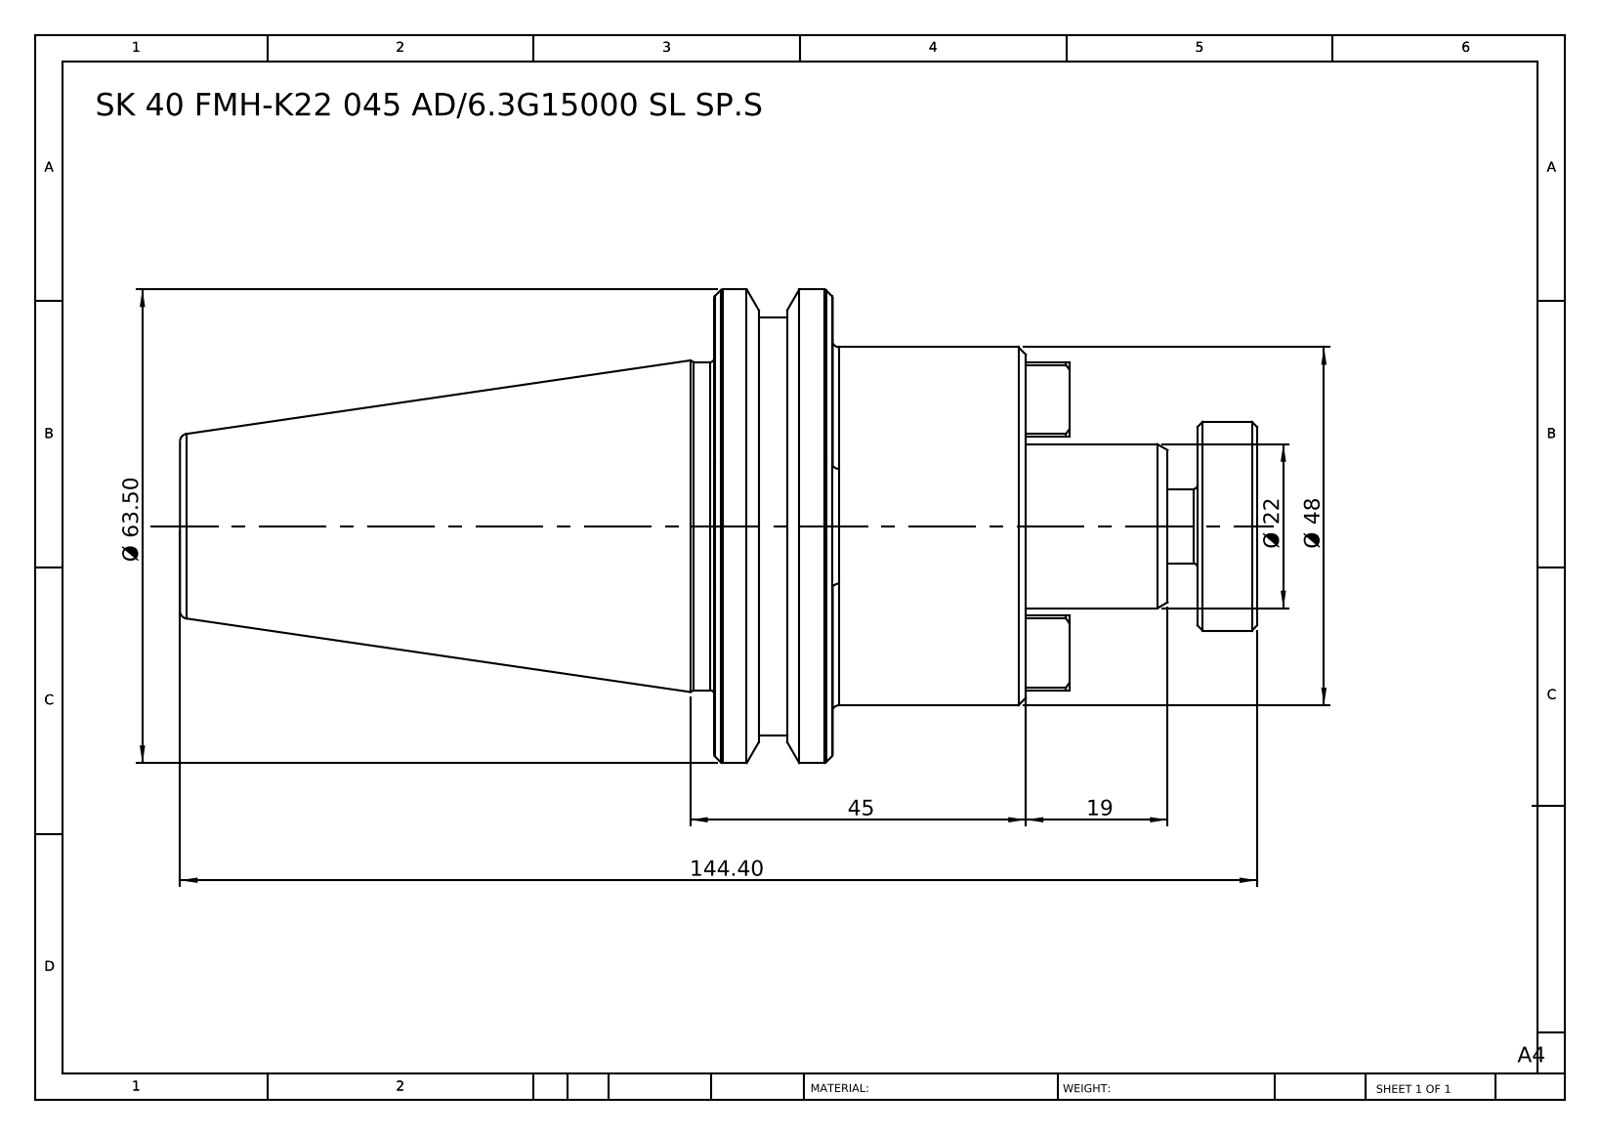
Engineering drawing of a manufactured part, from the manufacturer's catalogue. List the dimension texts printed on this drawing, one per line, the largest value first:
144.40
Ø 63.50
Ø 48
45
Ø 22
19
